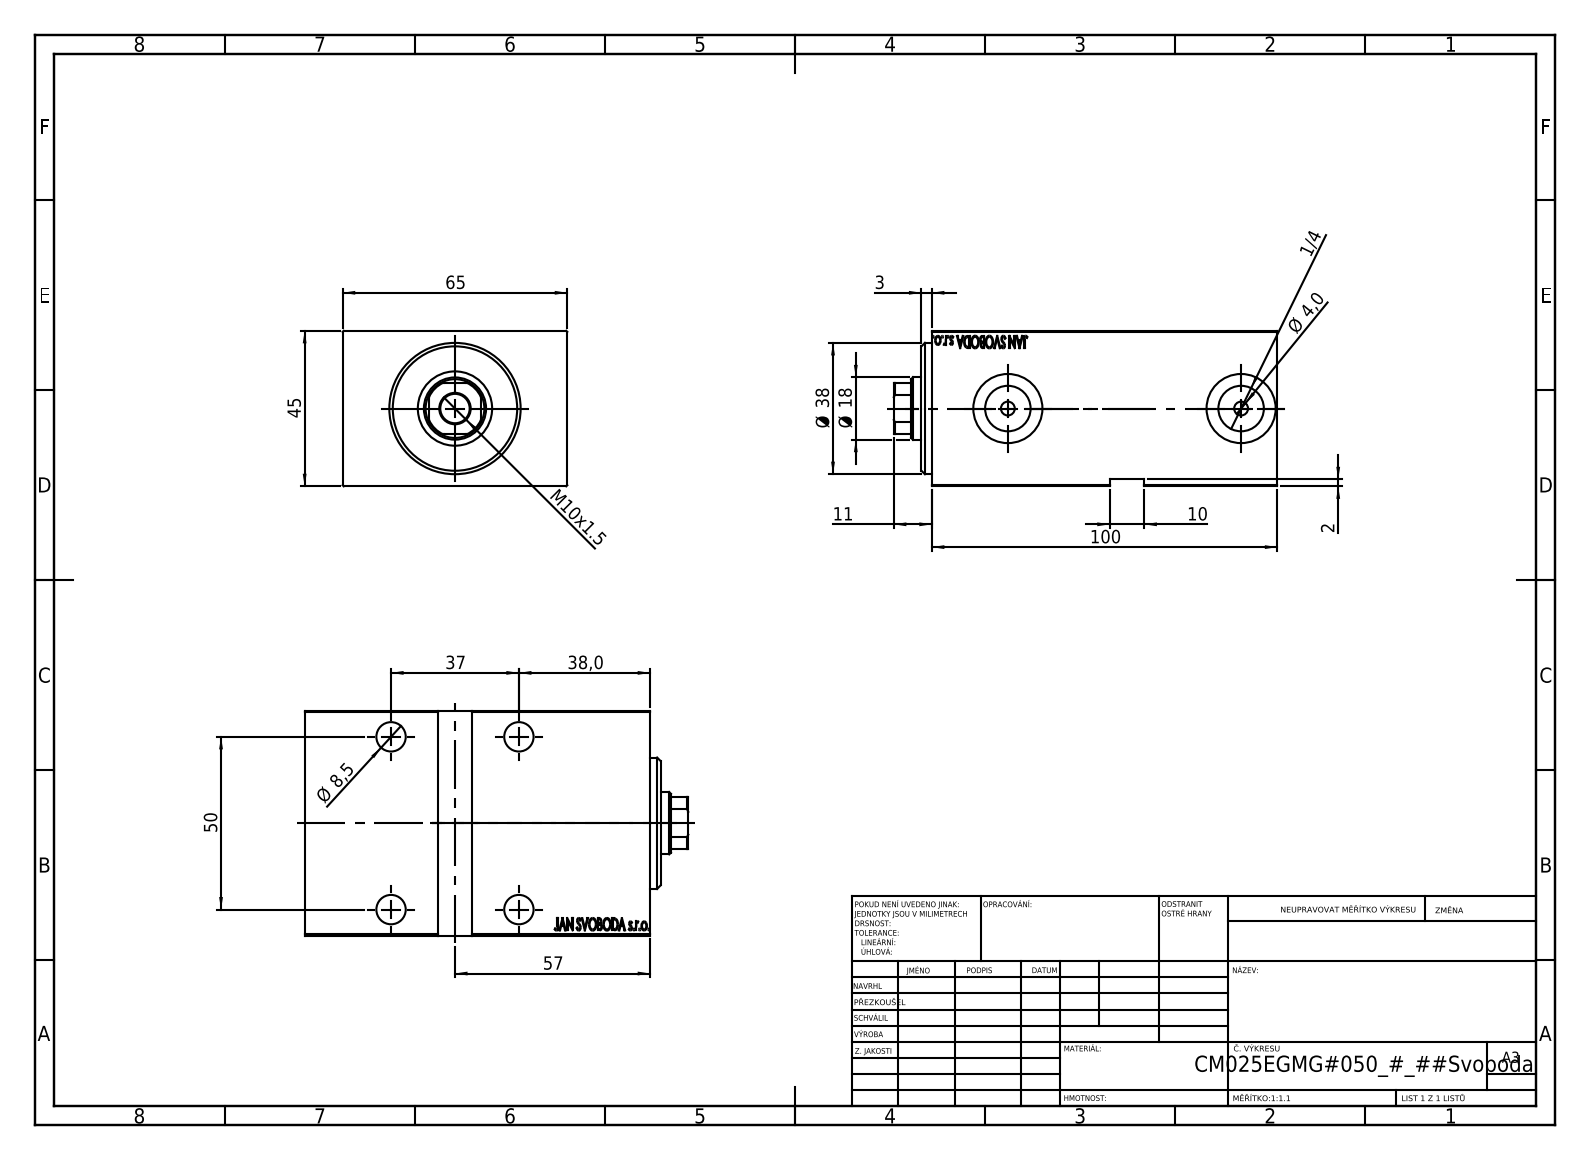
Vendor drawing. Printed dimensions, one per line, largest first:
100
65
57
50
45
Ø 38
38,0
37
Ø 18
11
M10x1.5
10
Ø 8,5
Ø 4,0
3
2
1/4
